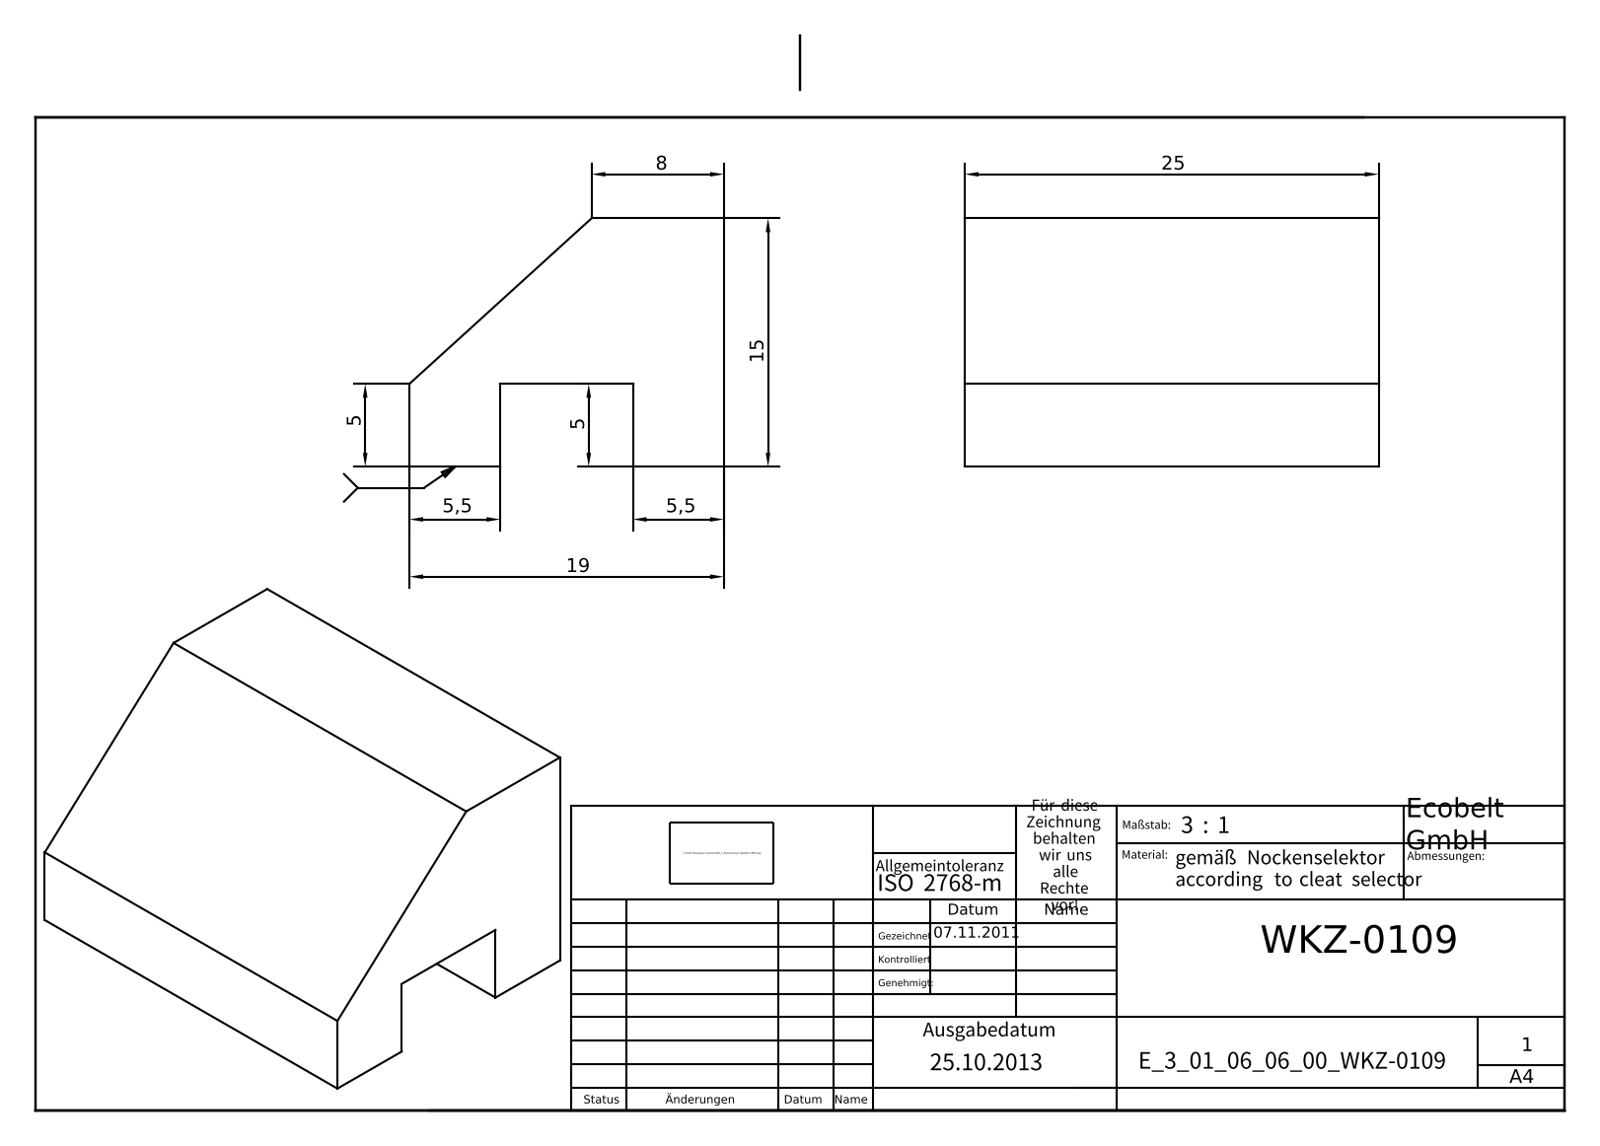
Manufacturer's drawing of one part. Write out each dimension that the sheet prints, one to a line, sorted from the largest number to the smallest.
25
19
15
8
5,5
5,5
5
5
